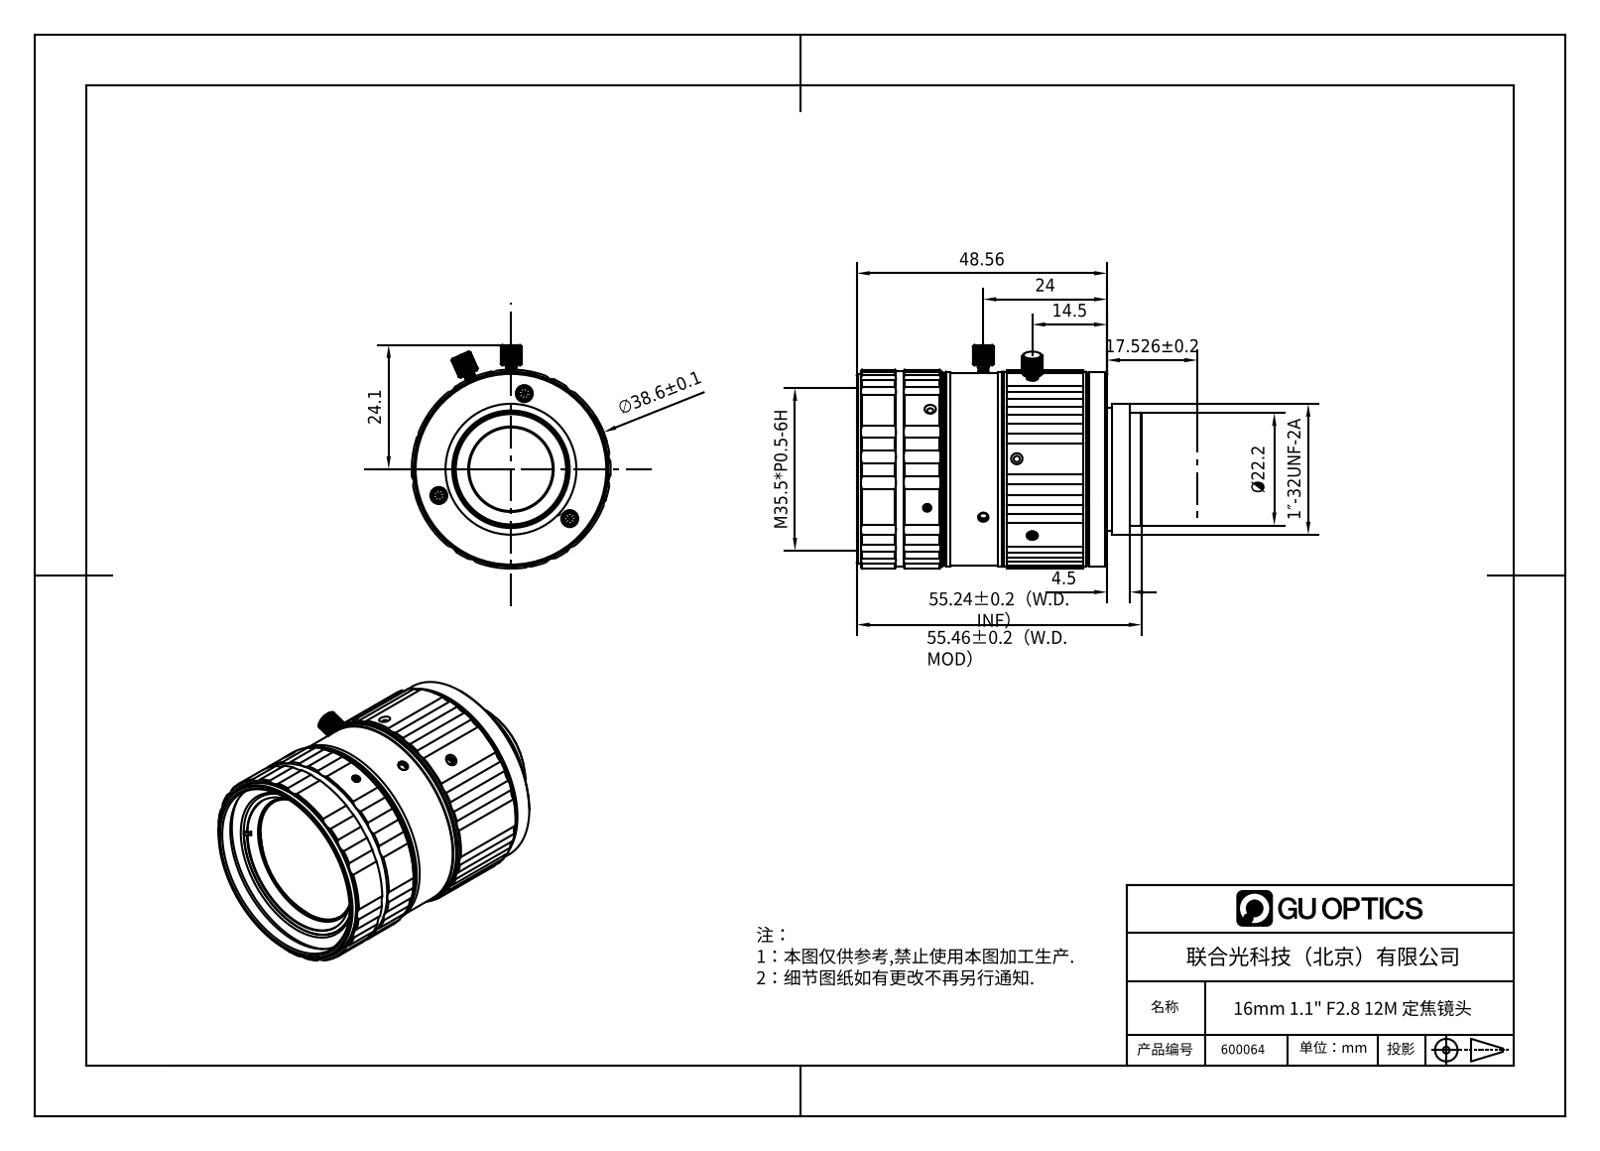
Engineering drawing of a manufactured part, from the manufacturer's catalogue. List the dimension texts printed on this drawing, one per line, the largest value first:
55.24±0.2（W.D. INF）
48.56
∅38.6±0.1
M35.5*P0.5-6H
24.1
24
Ø22.2
17.526±0.2
14.5
4.5
1″-32UNF-2A
